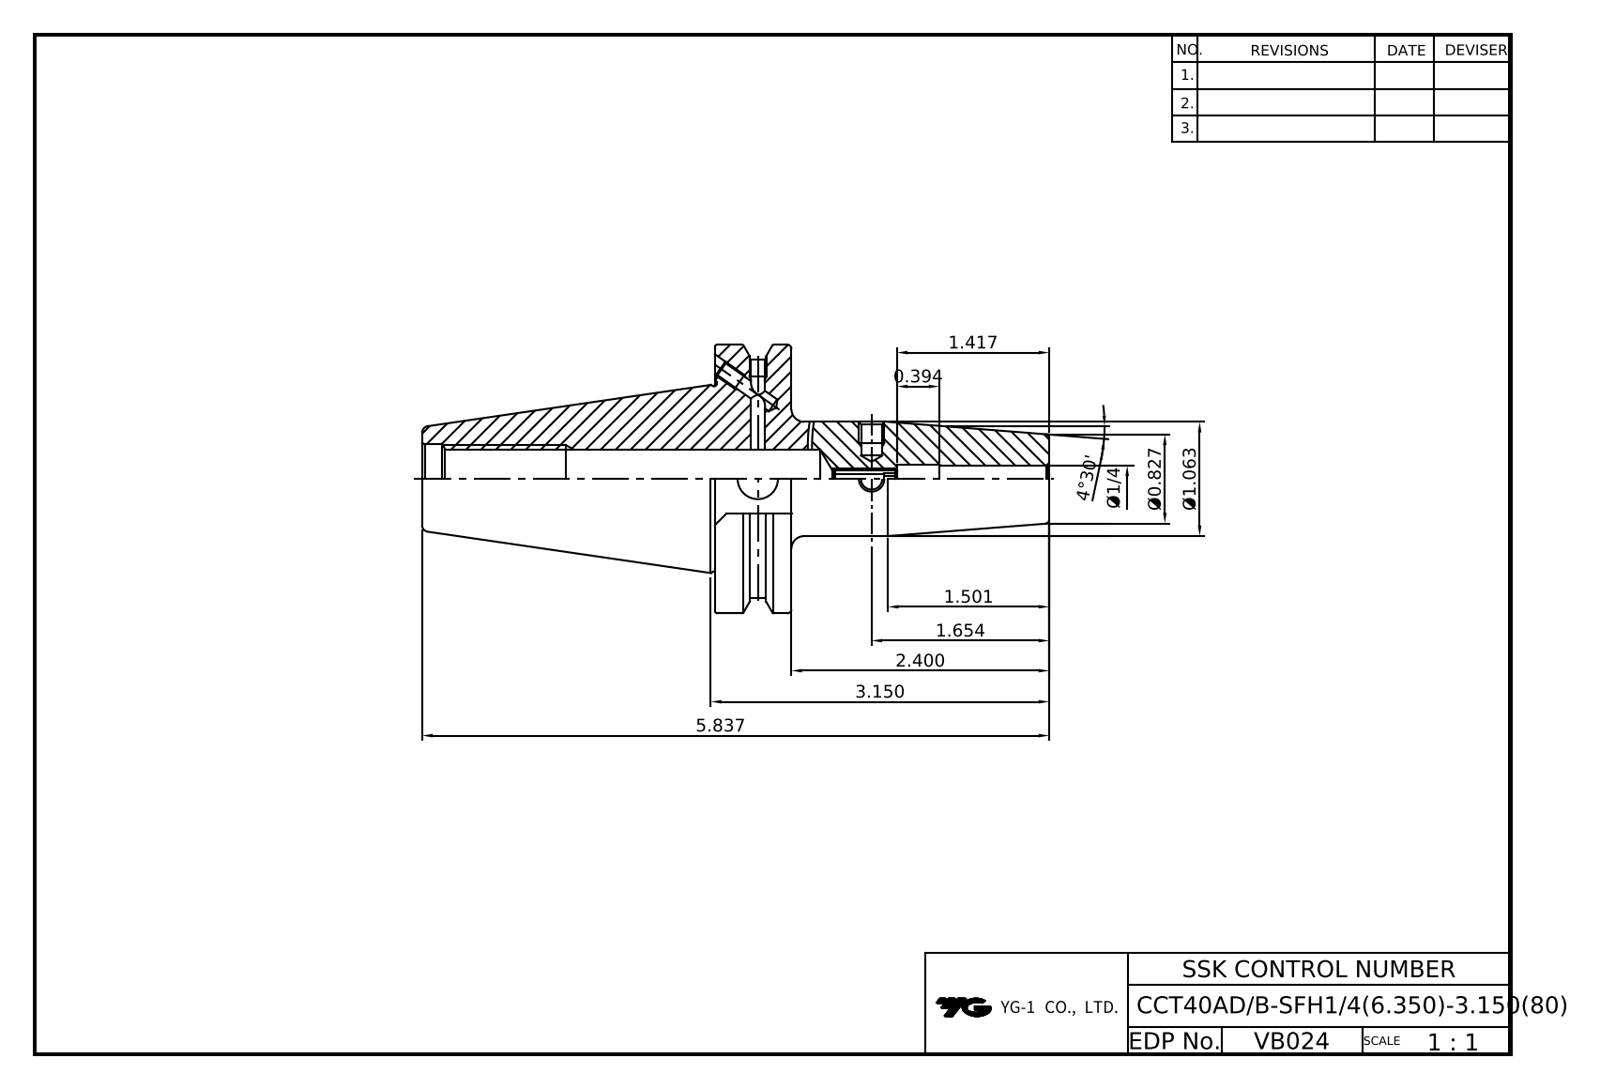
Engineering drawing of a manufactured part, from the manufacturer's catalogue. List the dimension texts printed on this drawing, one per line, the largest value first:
5.837
4°30'
3.150
2.400
1.654
1.501
1.417
Ø1.063
Ø0.827
0.394
